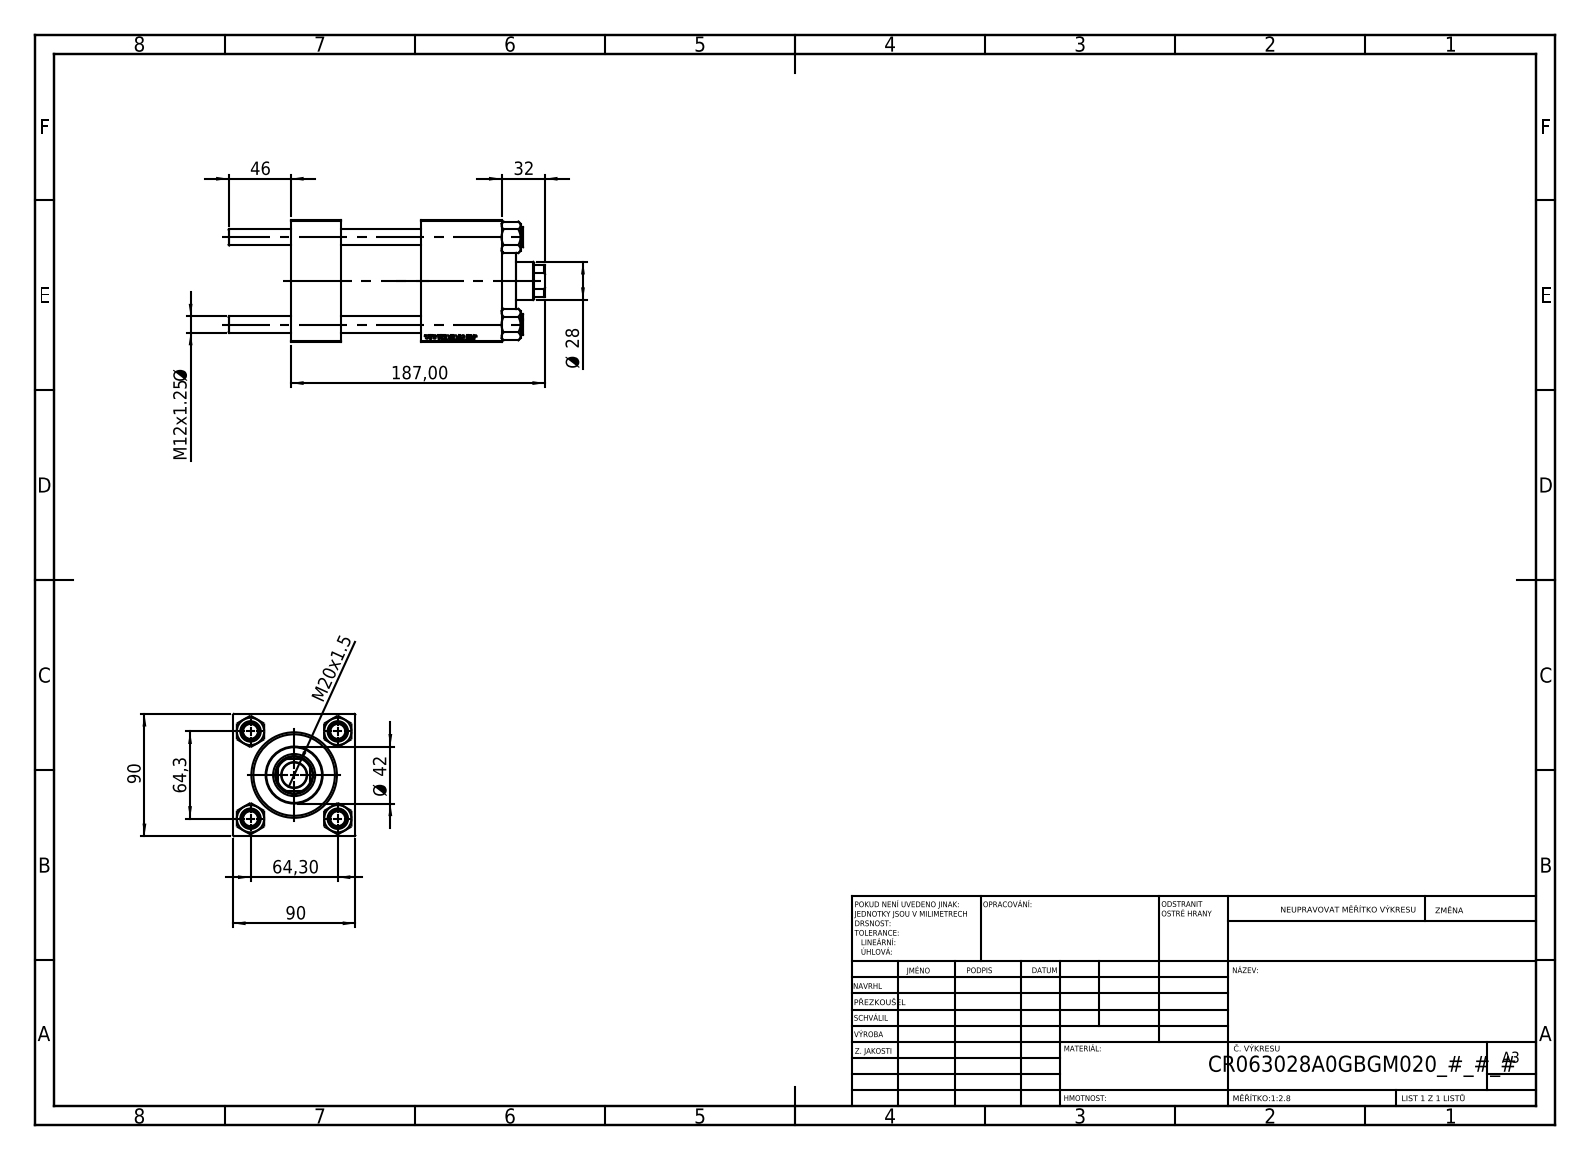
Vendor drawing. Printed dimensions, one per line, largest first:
187,00
90
90
64,3
64,30
46
Ø 42
32
Ø 28
M20x1.5
M12x1.25 Ø
